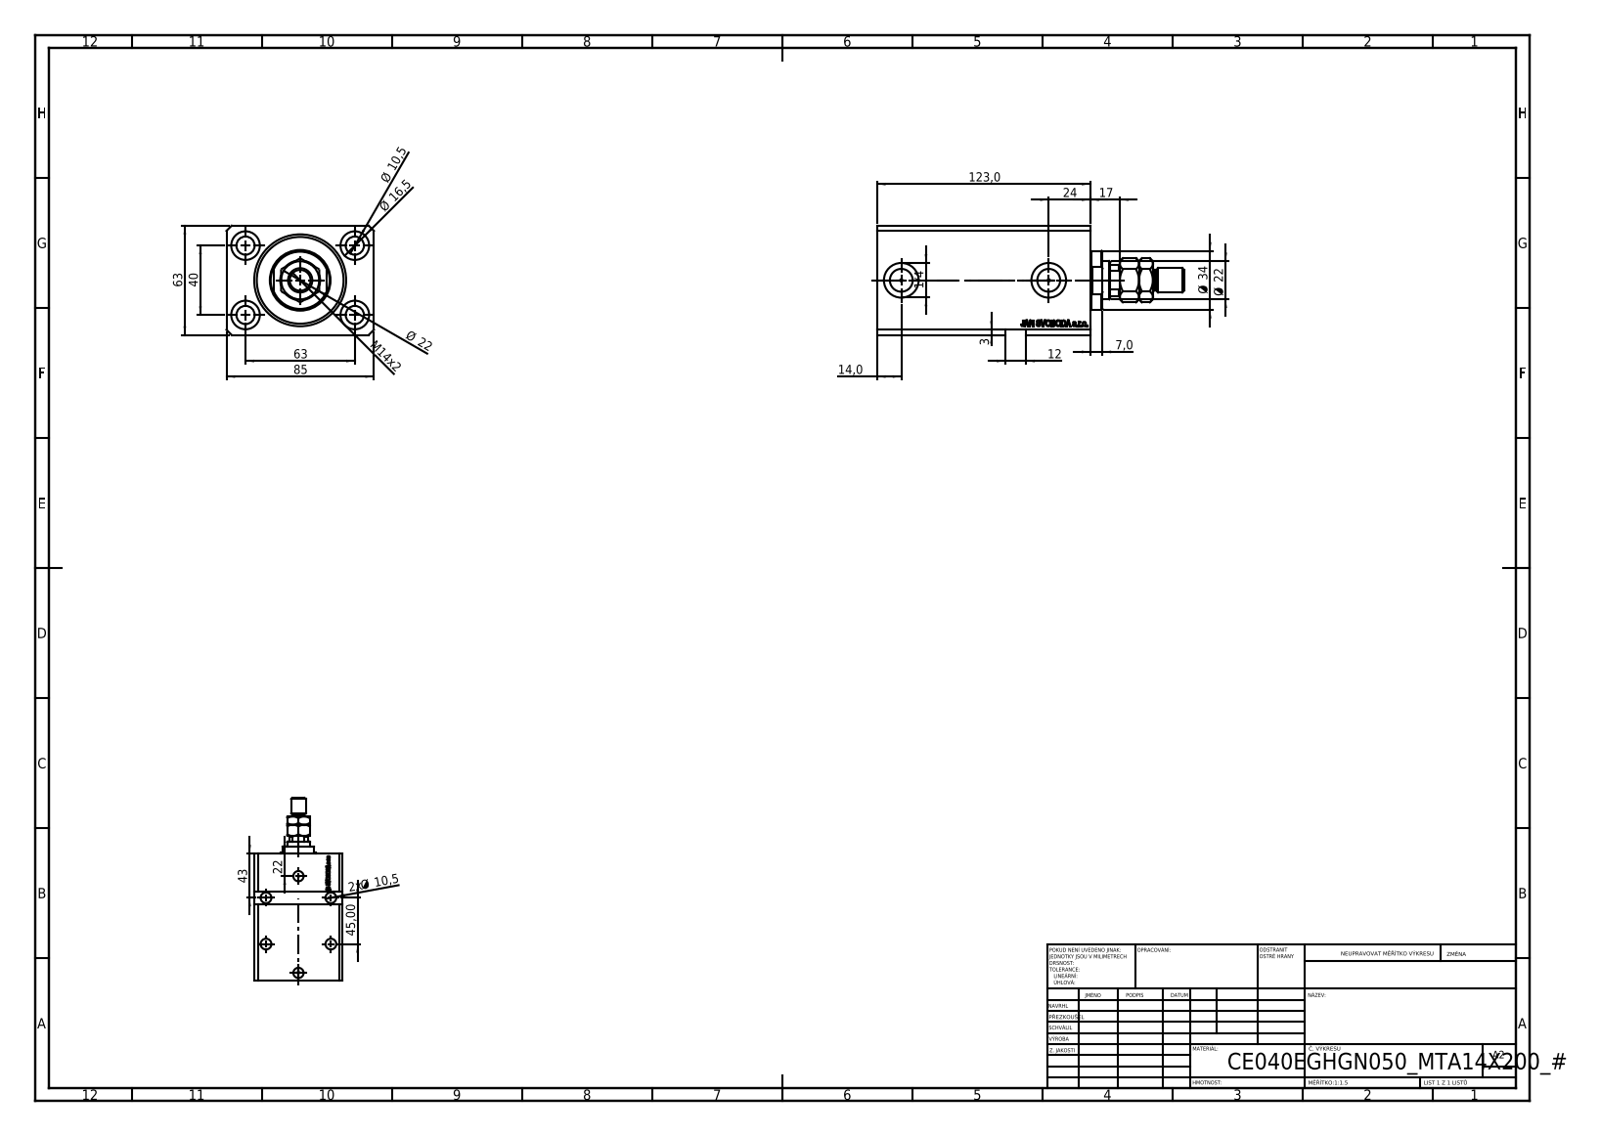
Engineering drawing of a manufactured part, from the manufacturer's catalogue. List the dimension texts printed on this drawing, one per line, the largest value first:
123,0
85
63
63
45,00
43
40
Ø 34
24
Ø 22
Ø 22
22
17
Ø 16,5
M14x2
14,0
12
Ø 10,5
2x Ø 10,5
7,0
3
1/4
